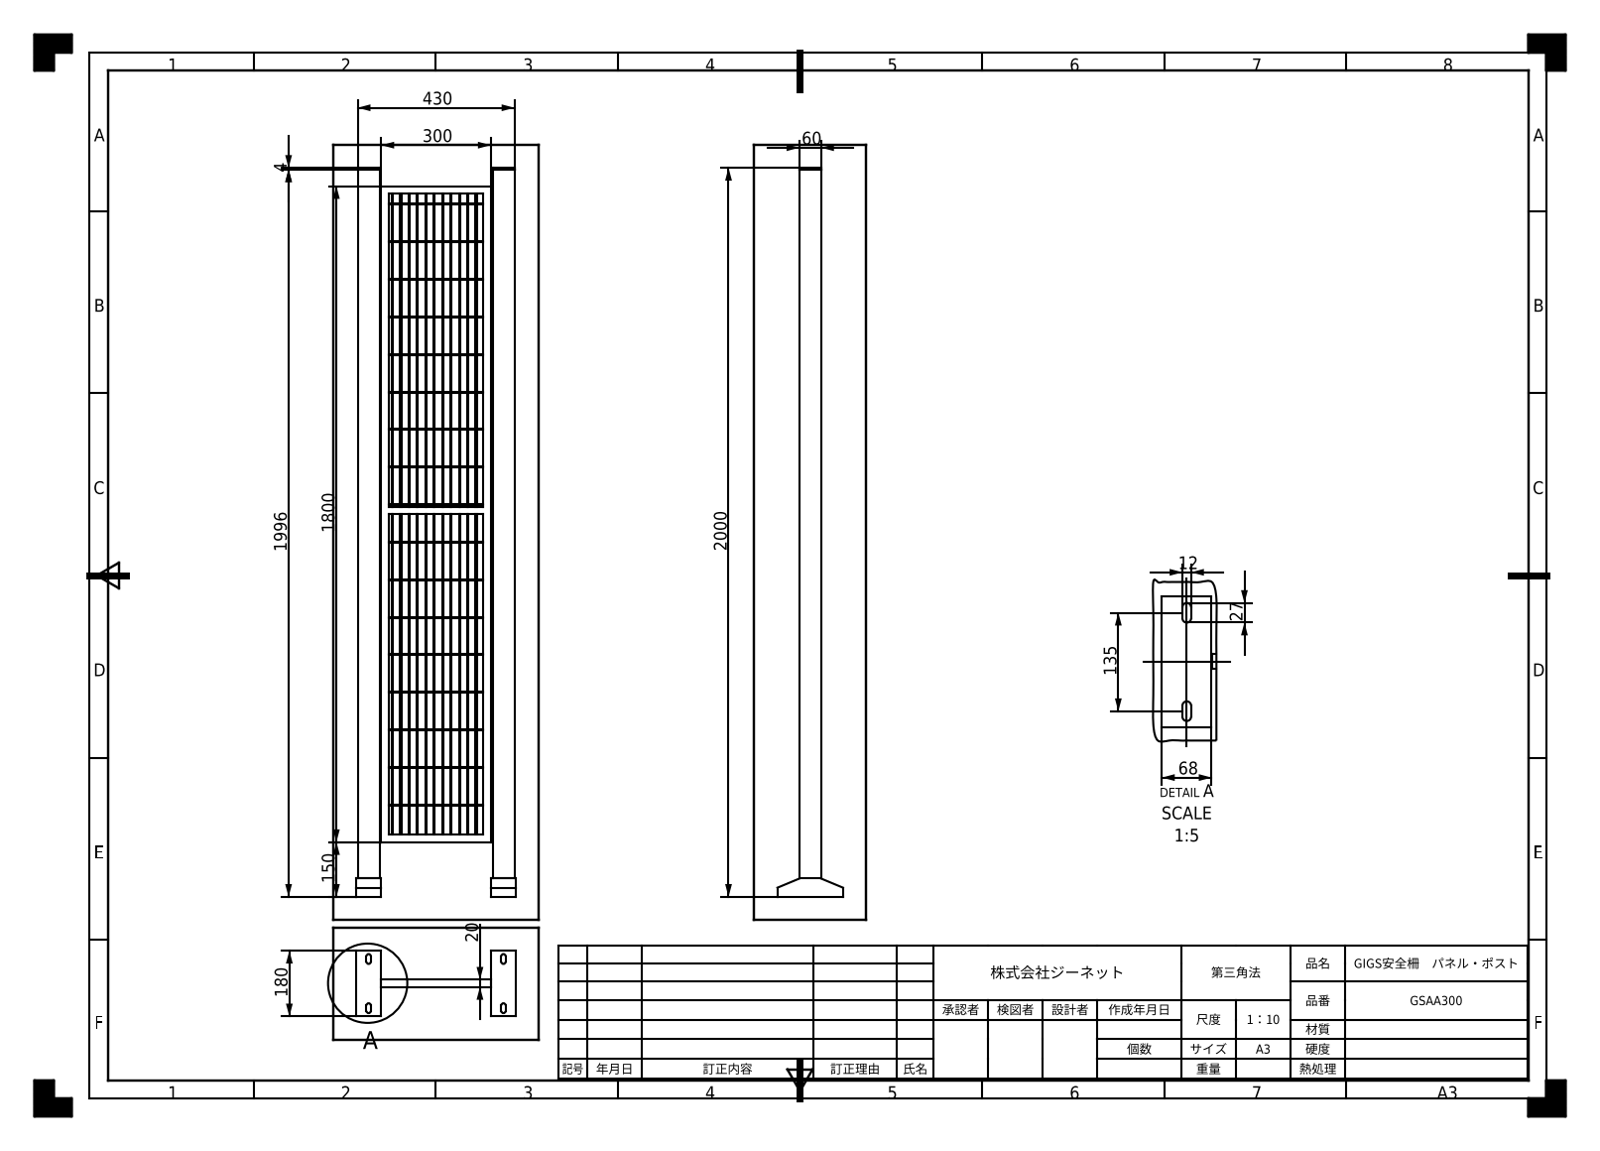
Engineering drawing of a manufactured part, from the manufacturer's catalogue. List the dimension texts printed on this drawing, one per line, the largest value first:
2000
1996
1800
430
300
180
150
135
68
60
27
20
12
4
